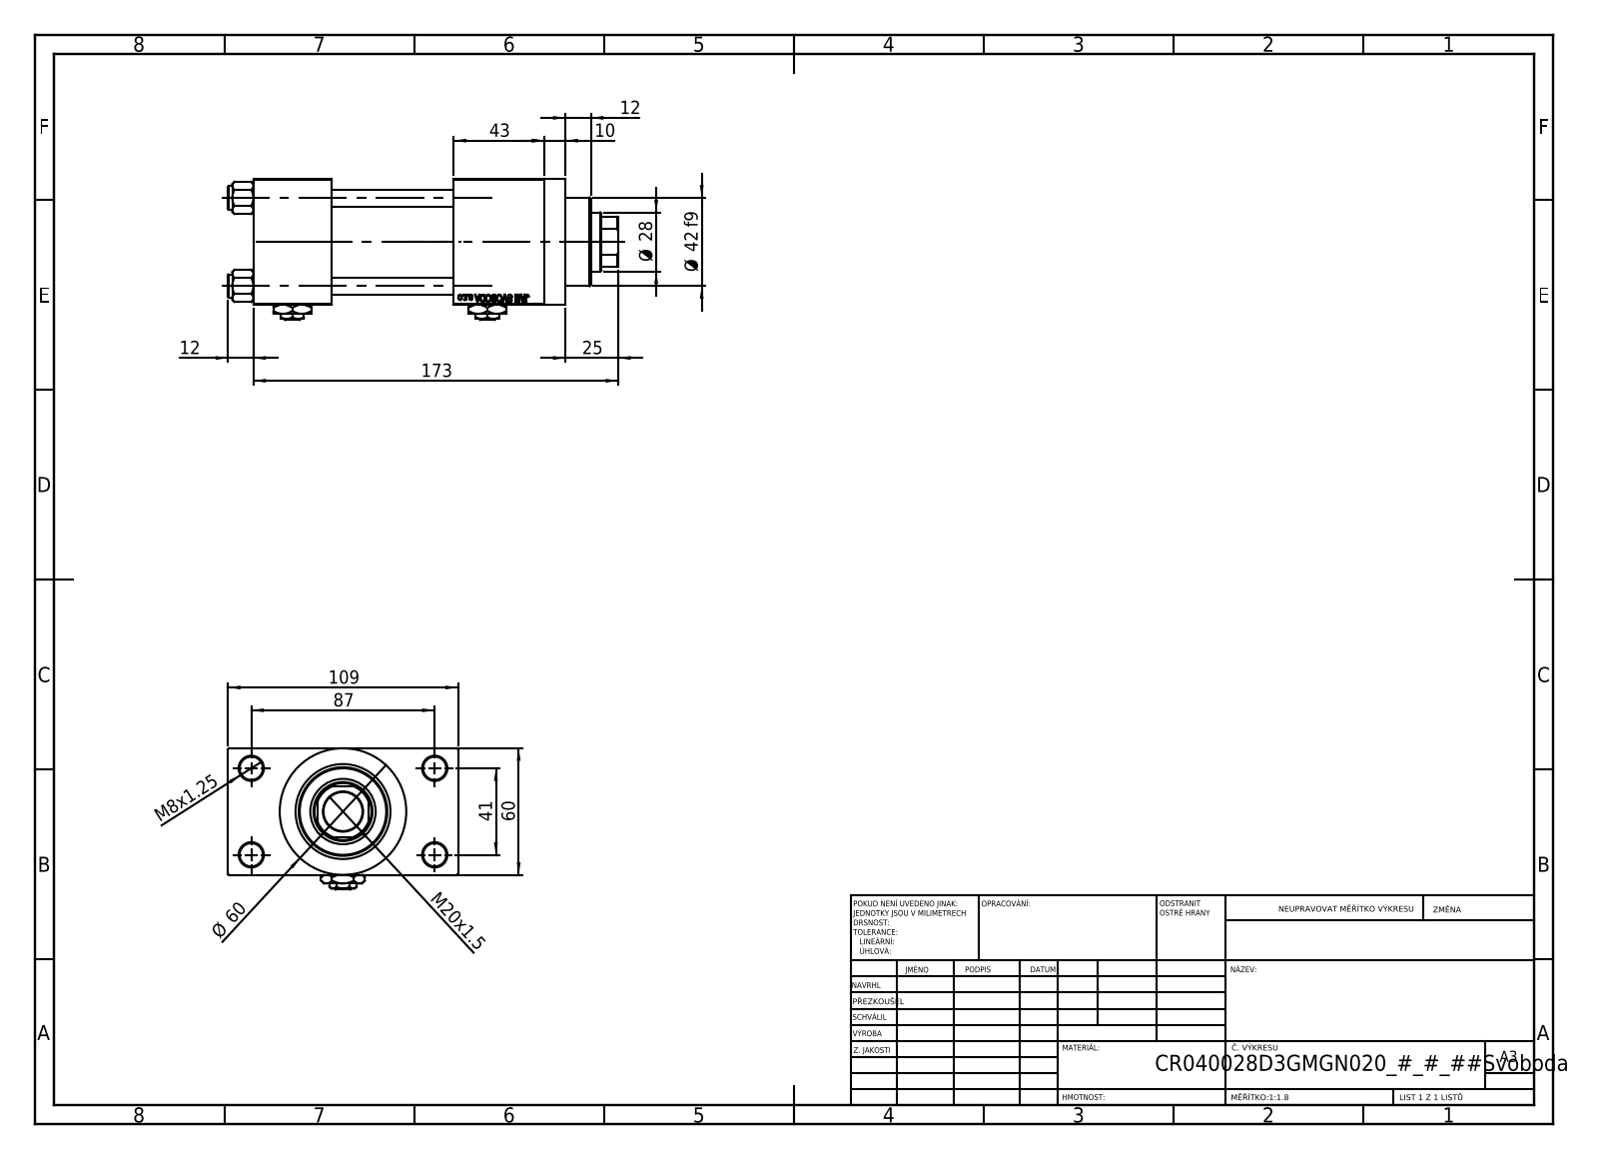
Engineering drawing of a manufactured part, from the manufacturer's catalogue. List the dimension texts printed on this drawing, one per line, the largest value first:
173
109
87
Ø 60
60
43
Ø 42 f9
41
Ø 28
25
M20x1.5
12
12
10
M8x1.25
